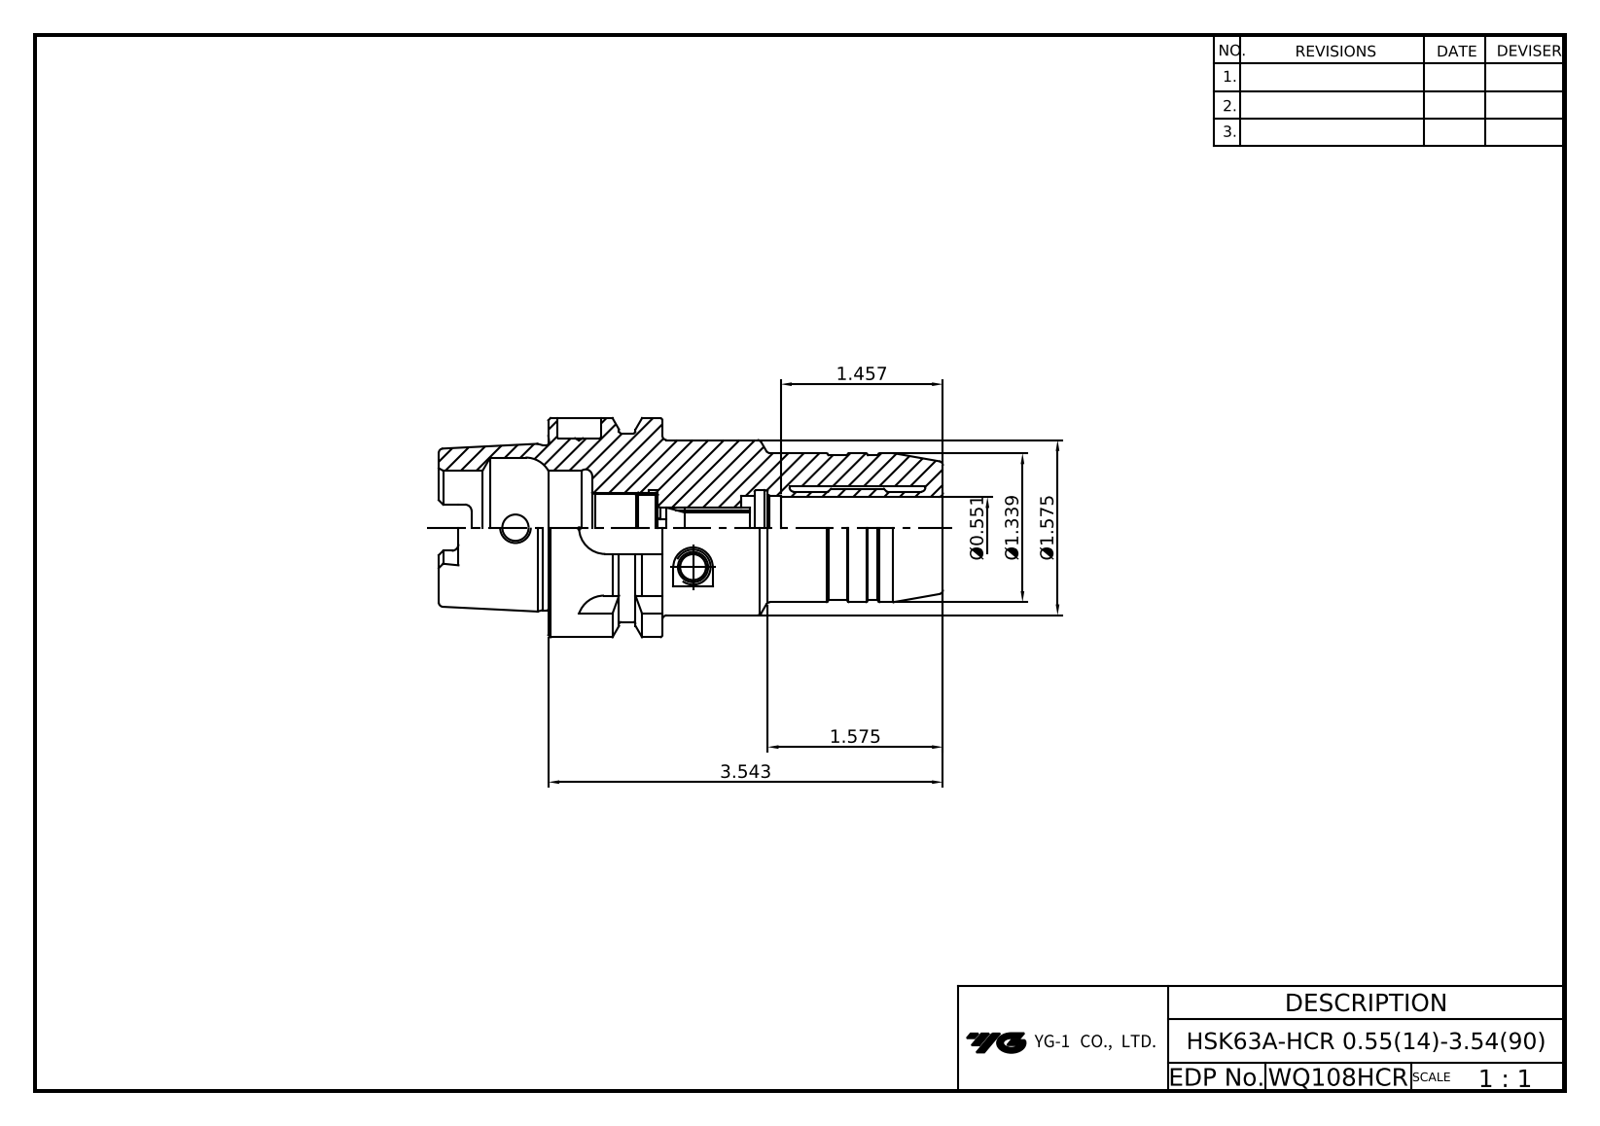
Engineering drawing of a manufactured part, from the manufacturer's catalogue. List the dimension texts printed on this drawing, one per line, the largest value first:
3.543
1.575
Ø1.575
1.457
Ø1.339
Ø0.551
